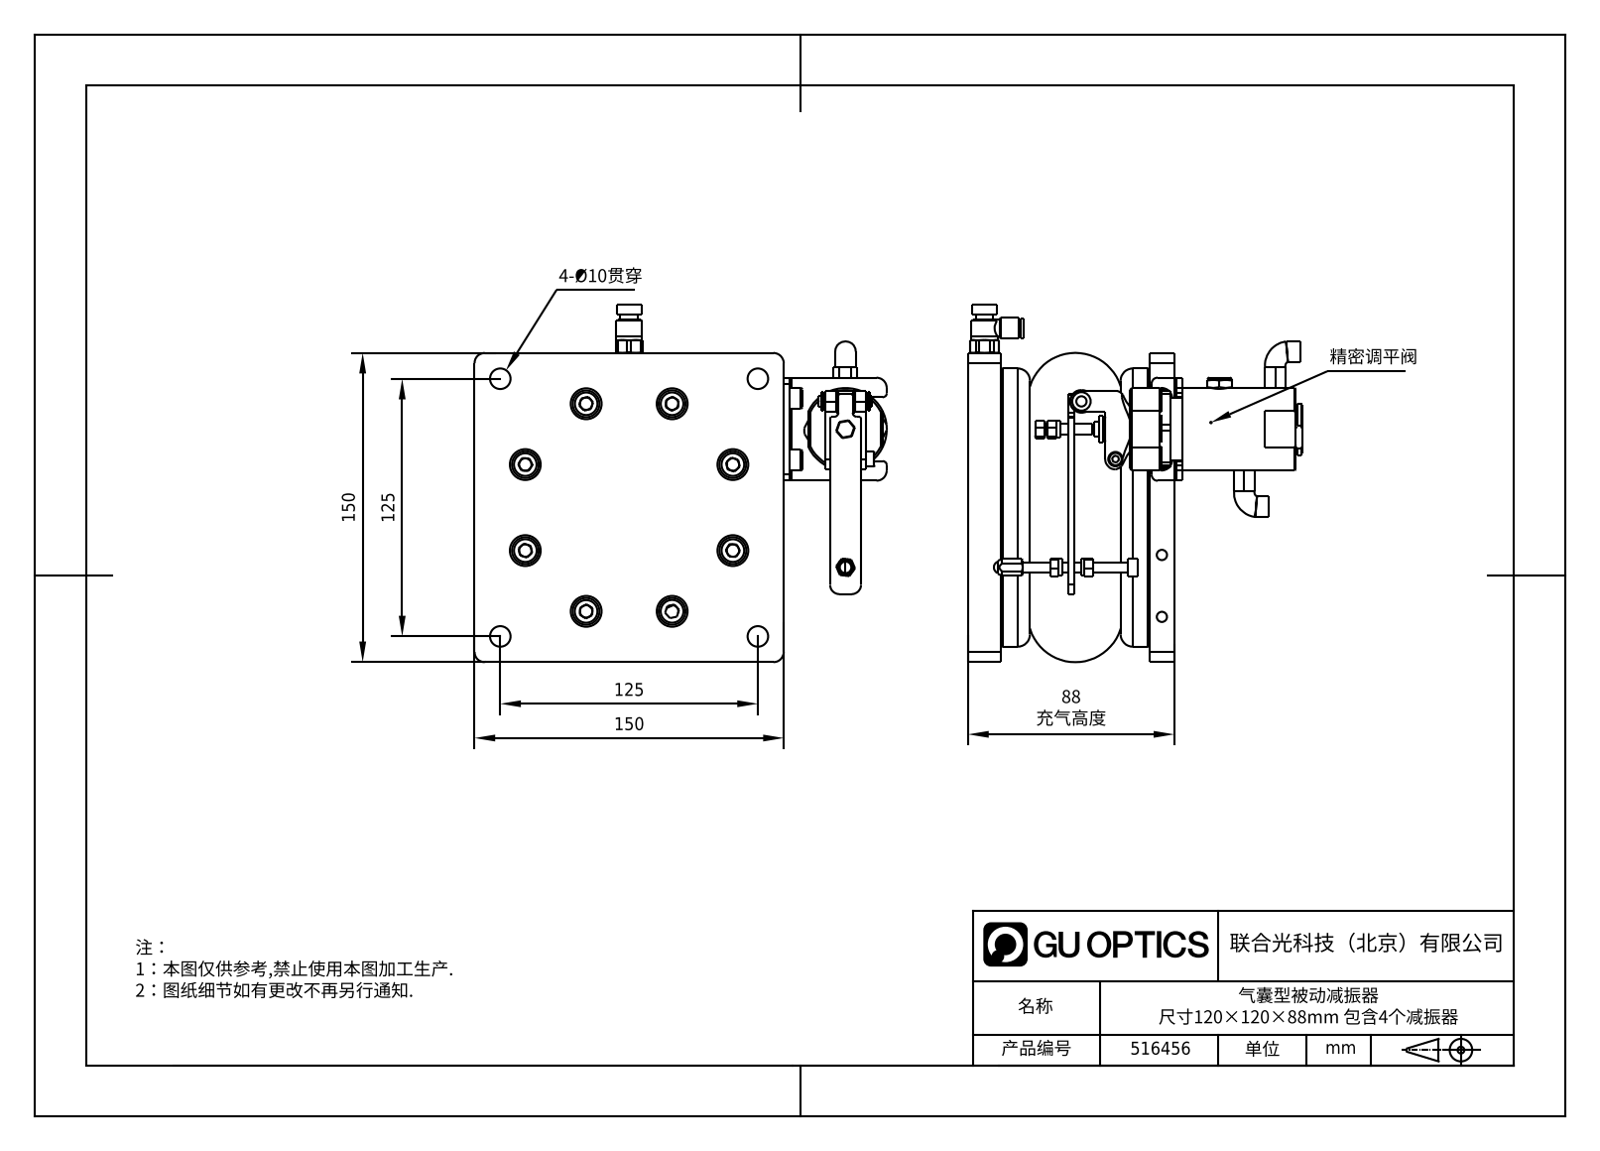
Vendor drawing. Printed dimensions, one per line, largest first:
150
150
125
125
88 充气高度
